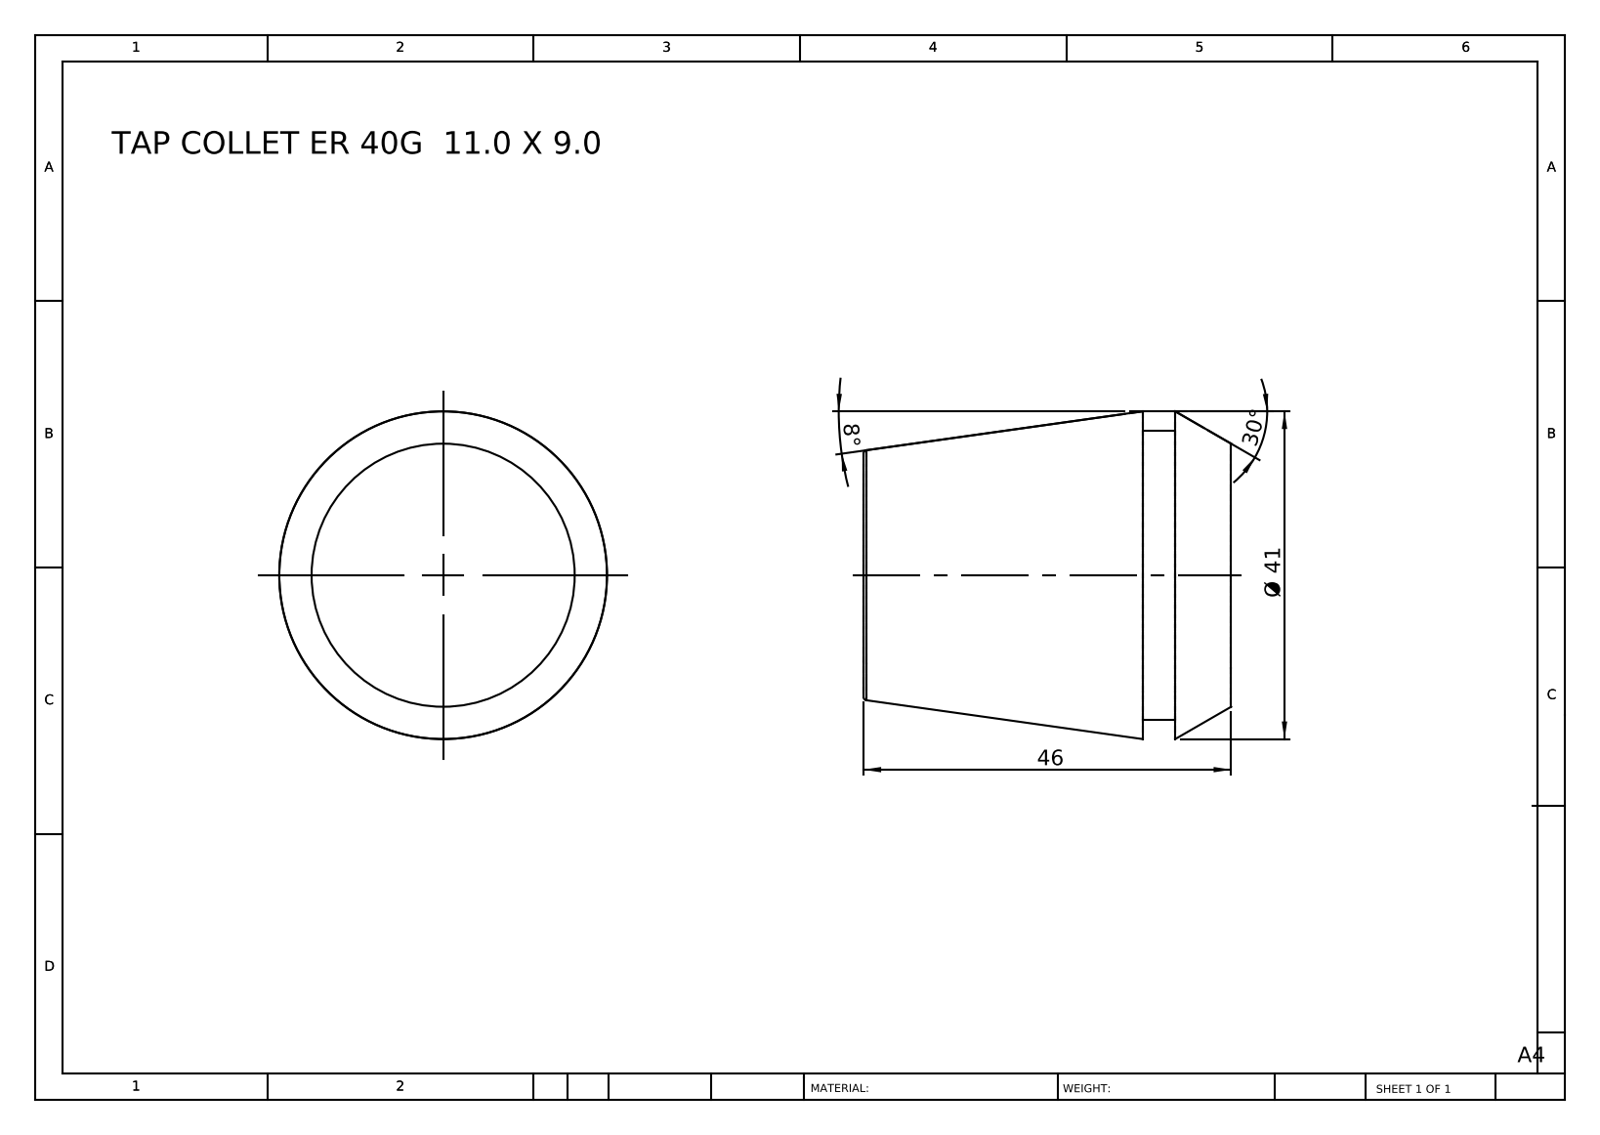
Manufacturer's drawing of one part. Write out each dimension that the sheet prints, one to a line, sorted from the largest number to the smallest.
46
Ø 41
30°
8°
